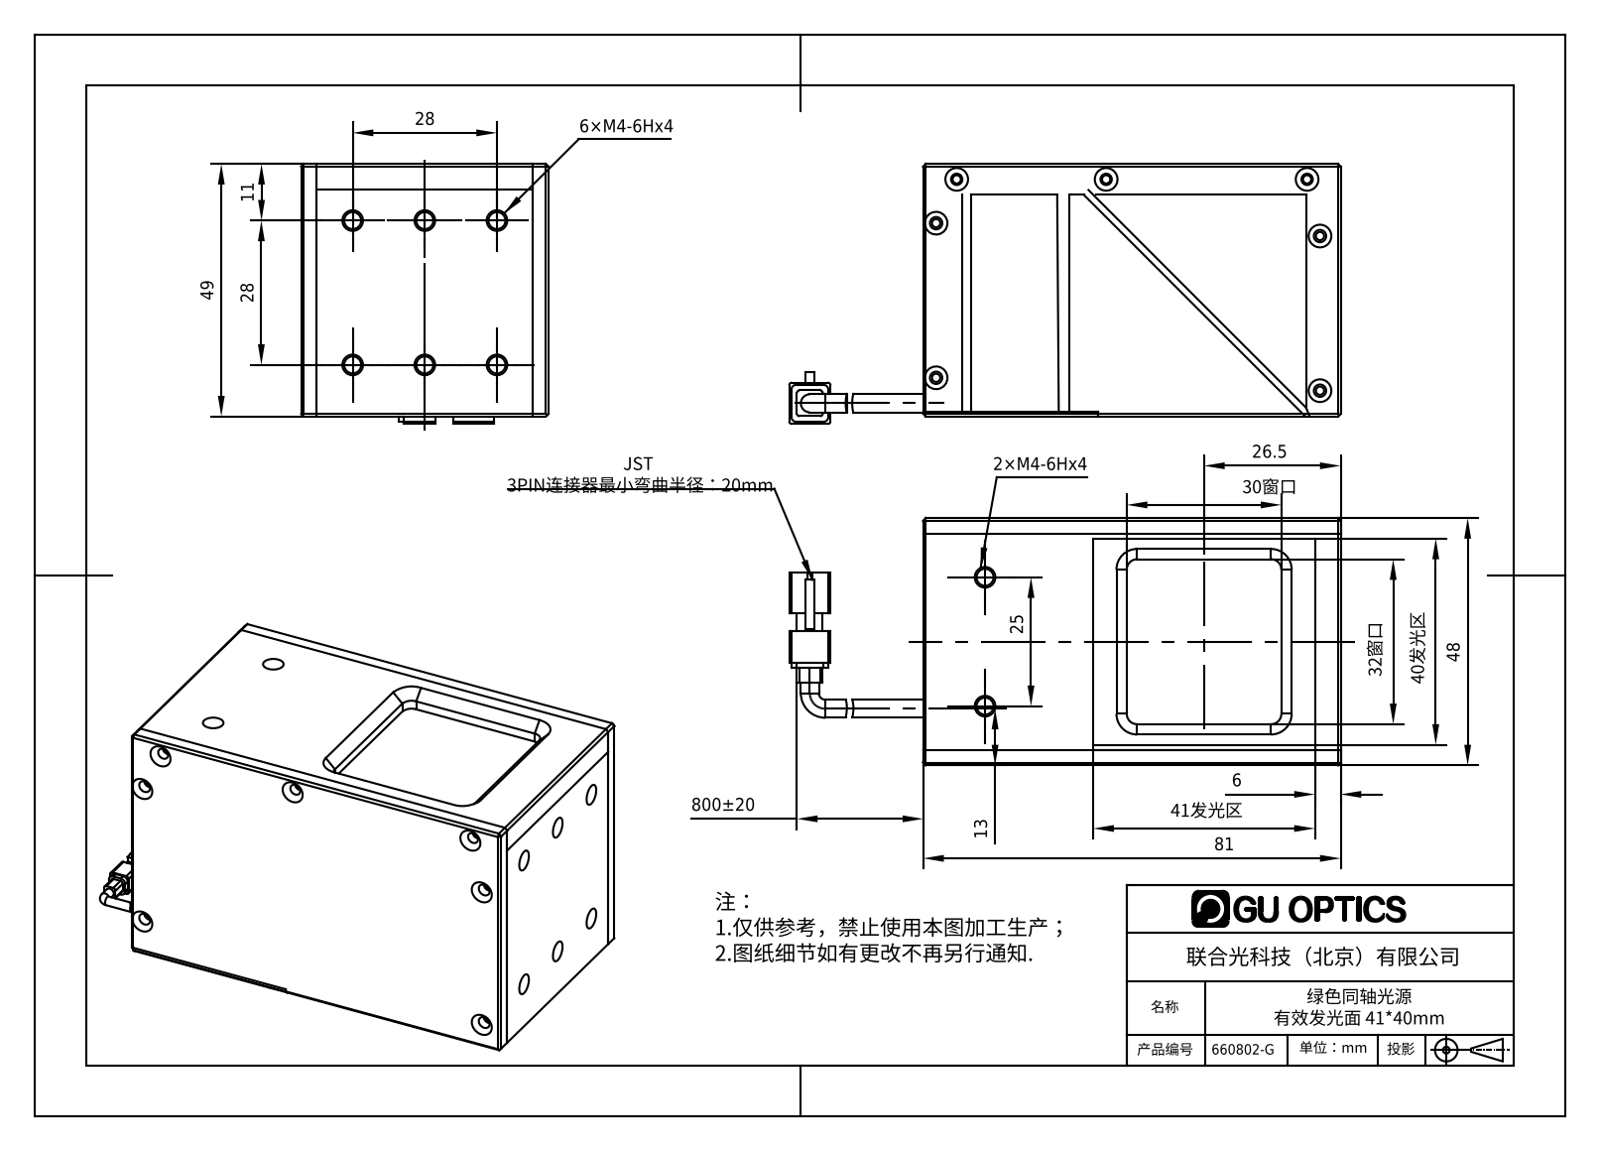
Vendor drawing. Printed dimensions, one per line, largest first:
800±20
81
49
48
41发光区
40发光区
32窗口
30窗口
28
28
26.5
25
13
11
6
